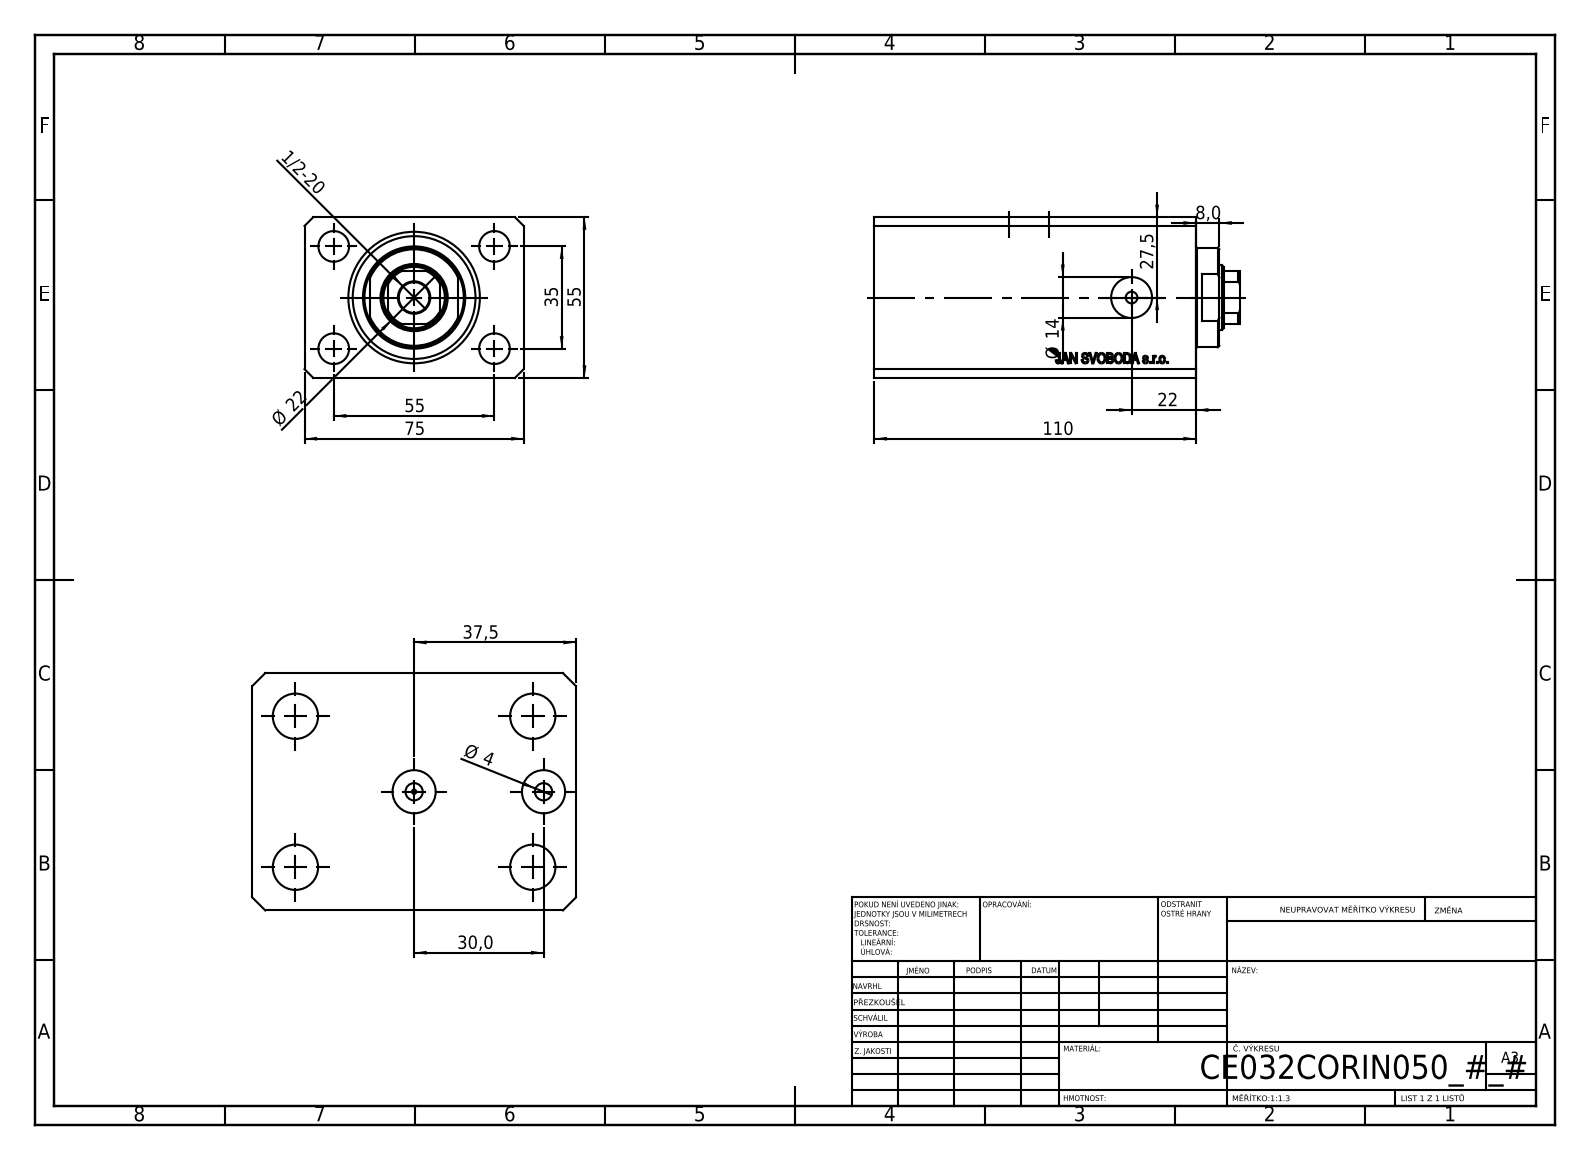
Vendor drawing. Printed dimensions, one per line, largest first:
110
75
55
55
37,5
35
30,0
27,5
Ø 22
22
Ø 14
8,0
Ø 4
1/2-20
